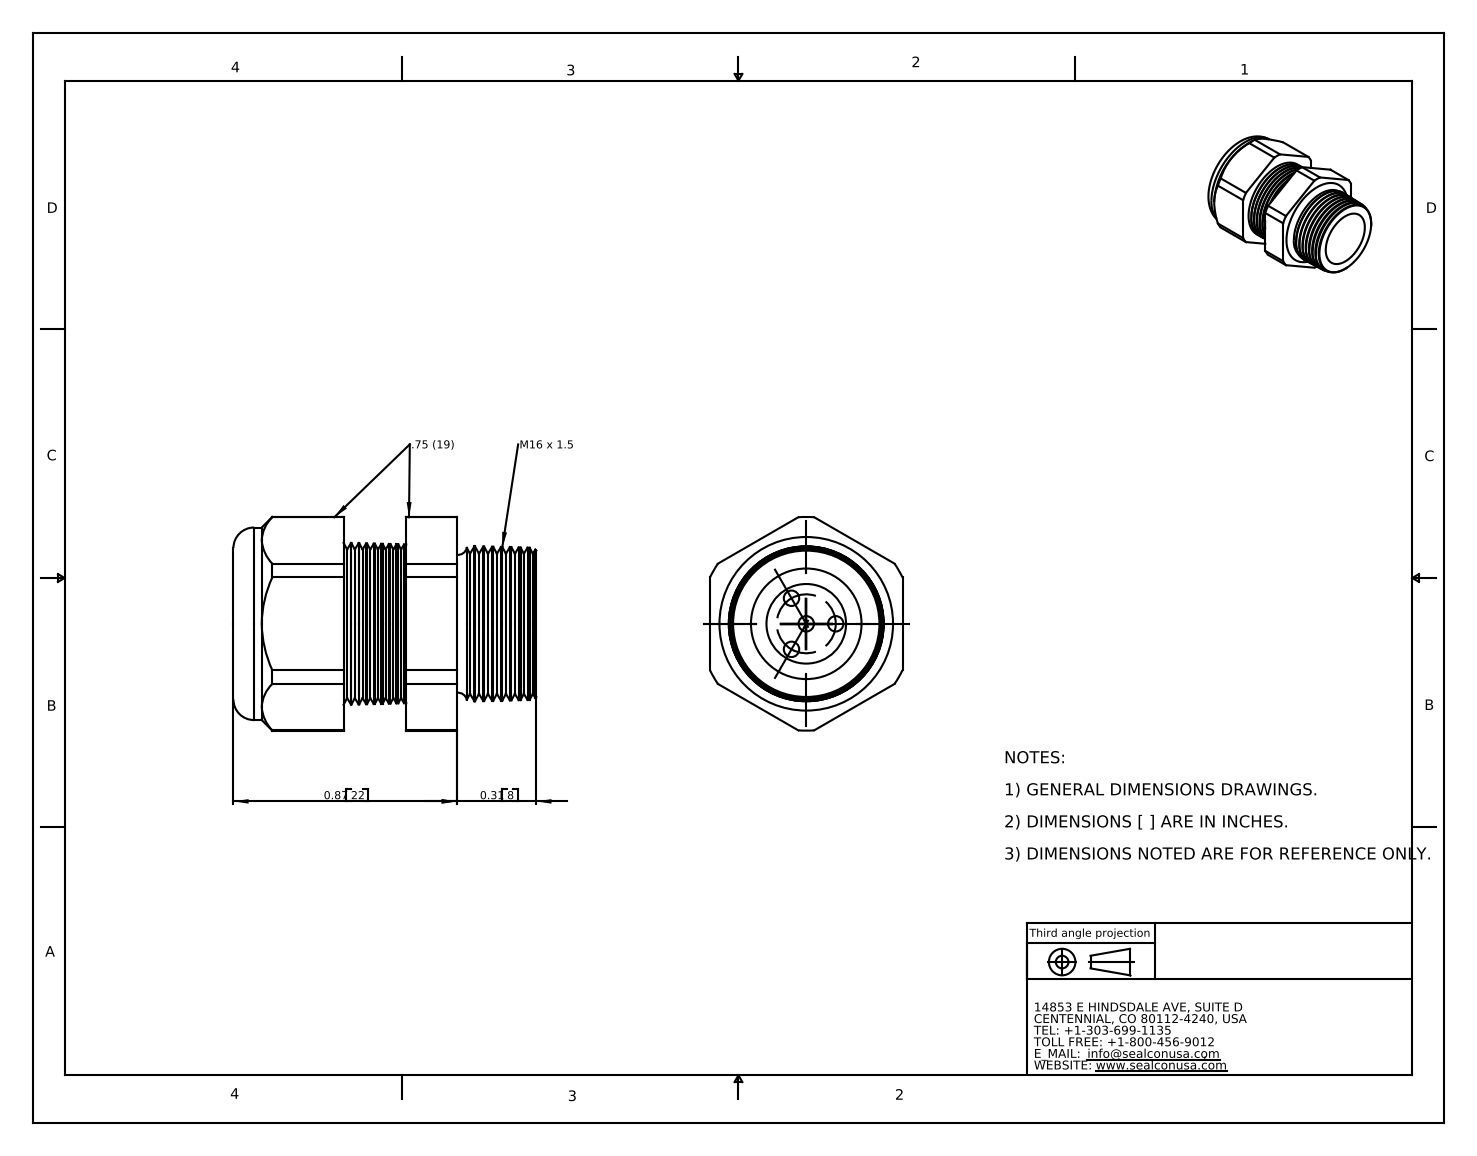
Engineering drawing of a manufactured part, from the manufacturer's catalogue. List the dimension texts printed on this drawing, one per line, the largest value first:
0.87 22
0.31 8
